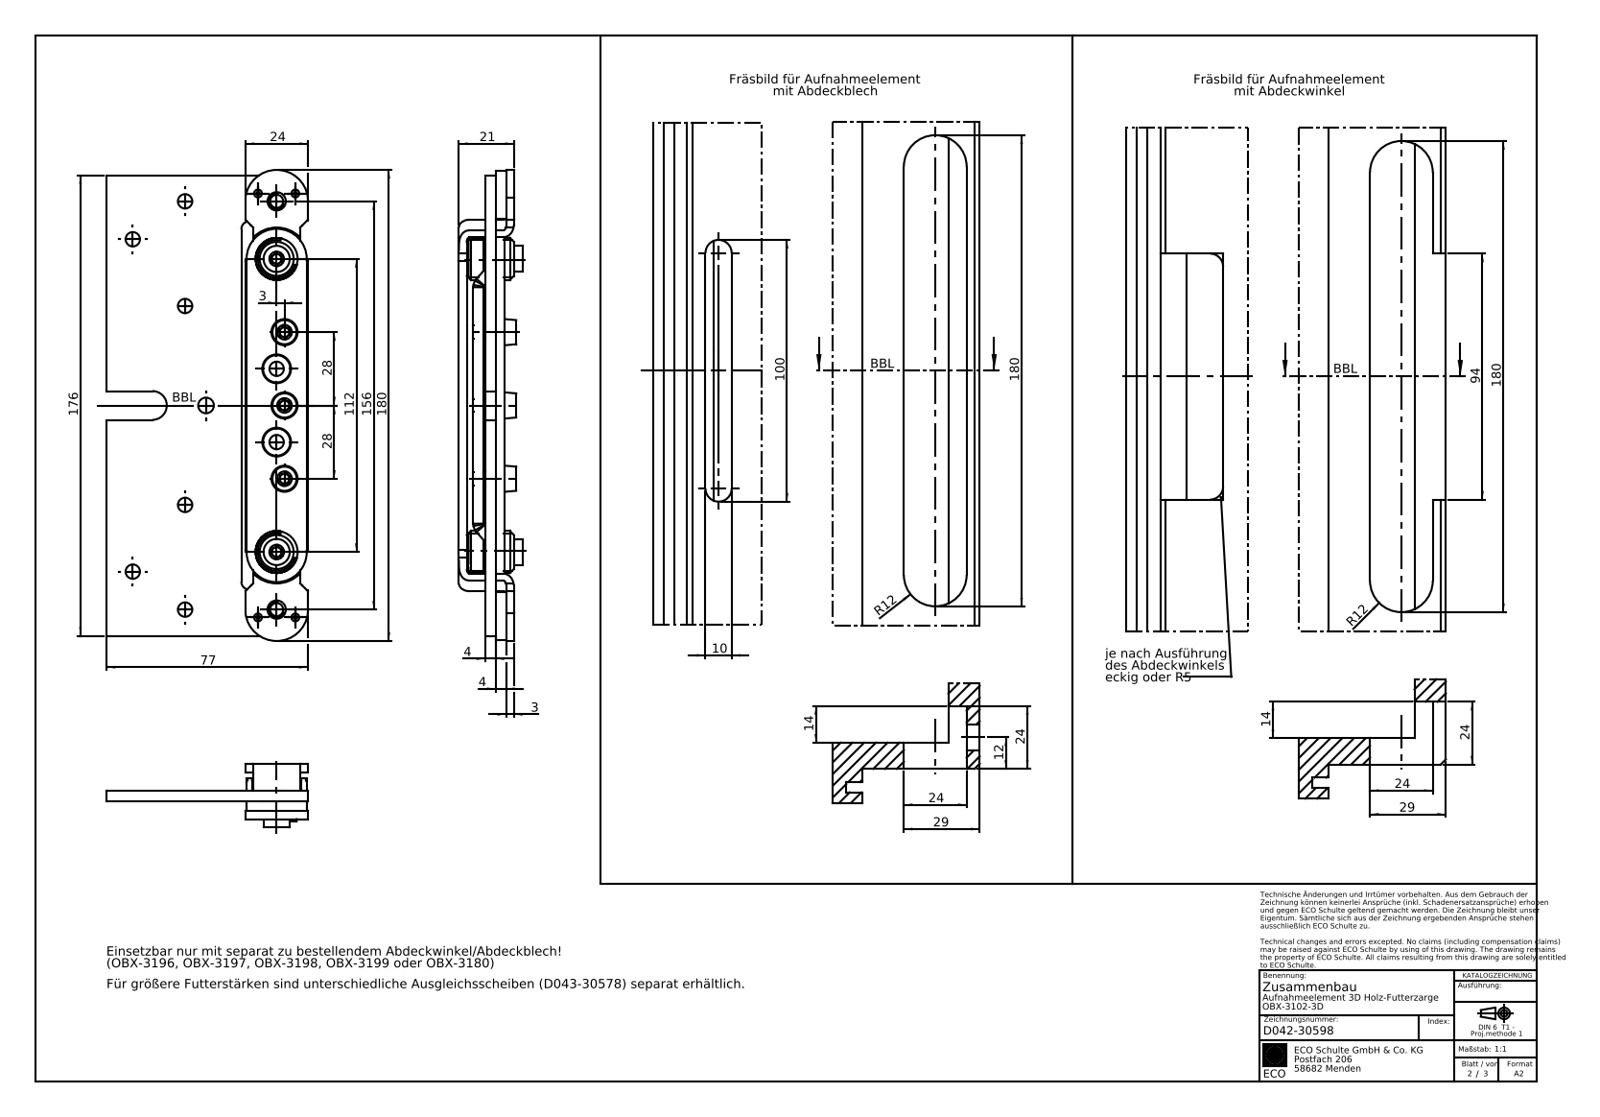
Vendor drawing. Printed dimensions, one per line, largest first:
180
180
180
176
156
112
100
94
77
29
29
28
28
24
24
24
24
24
21
14
14
R12
12
R12
10
4
4
3
3
